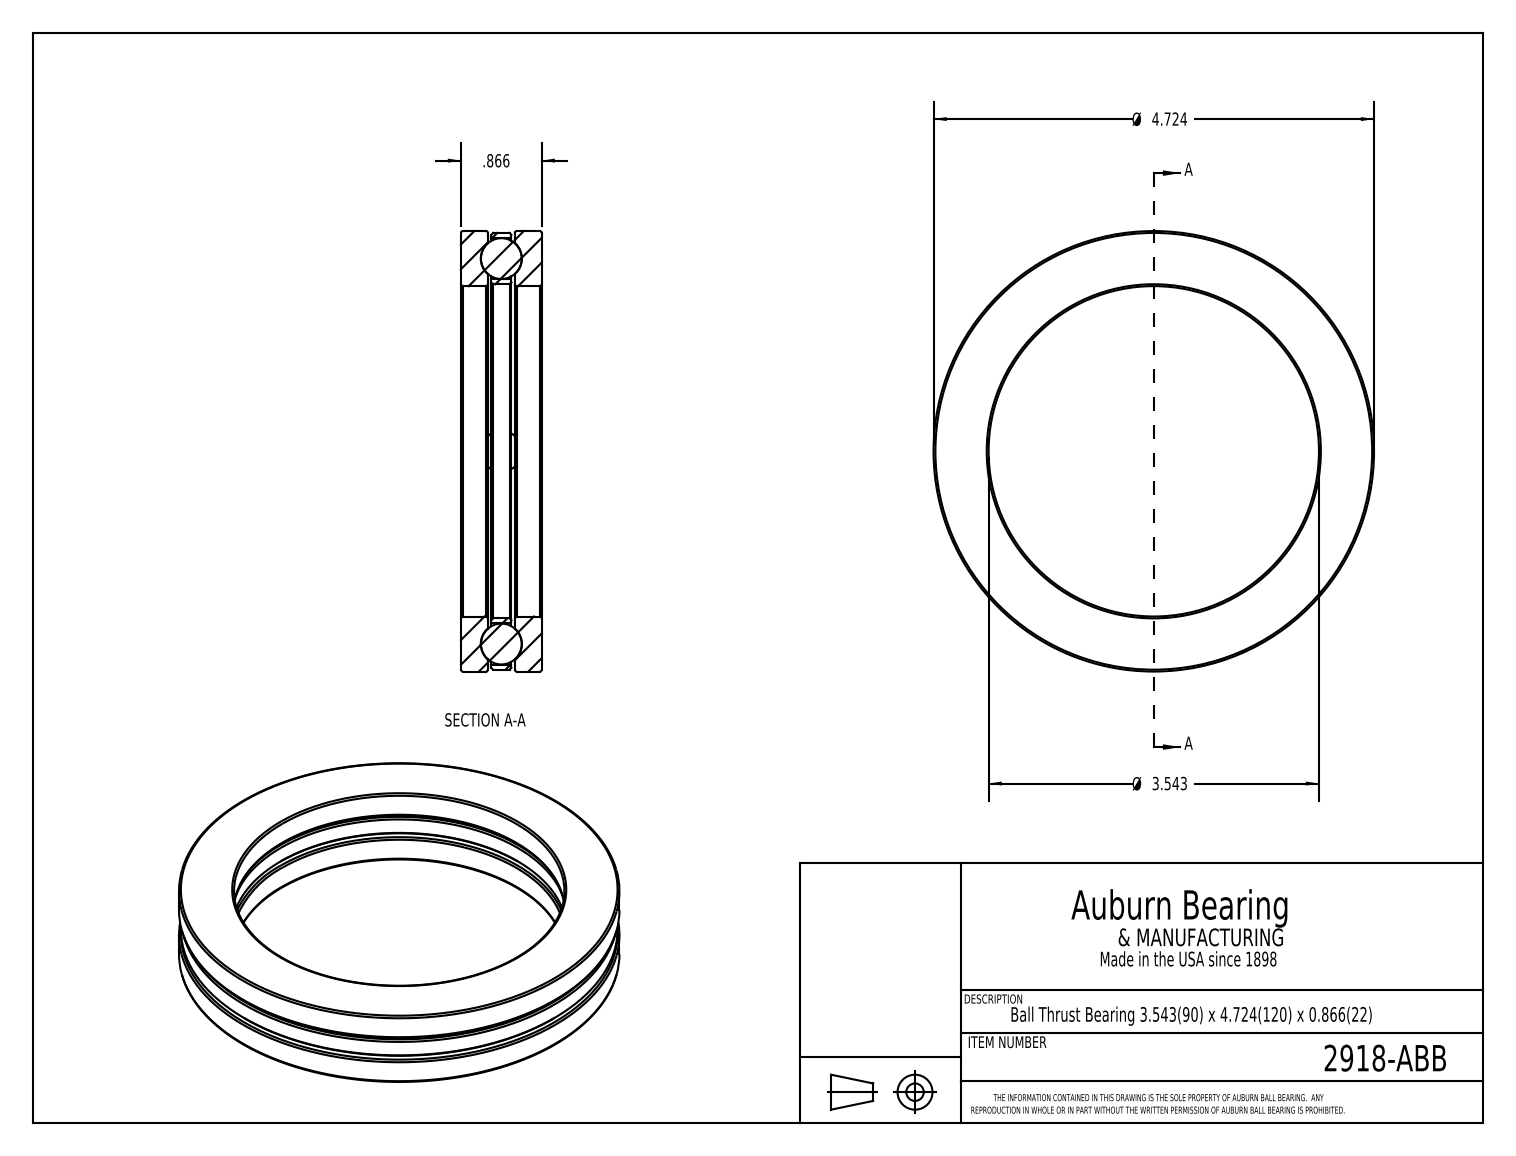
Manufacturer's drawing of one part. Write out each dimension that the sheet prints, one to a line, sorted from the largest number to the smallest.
Ø 4.724
Ø 3.543
.866
